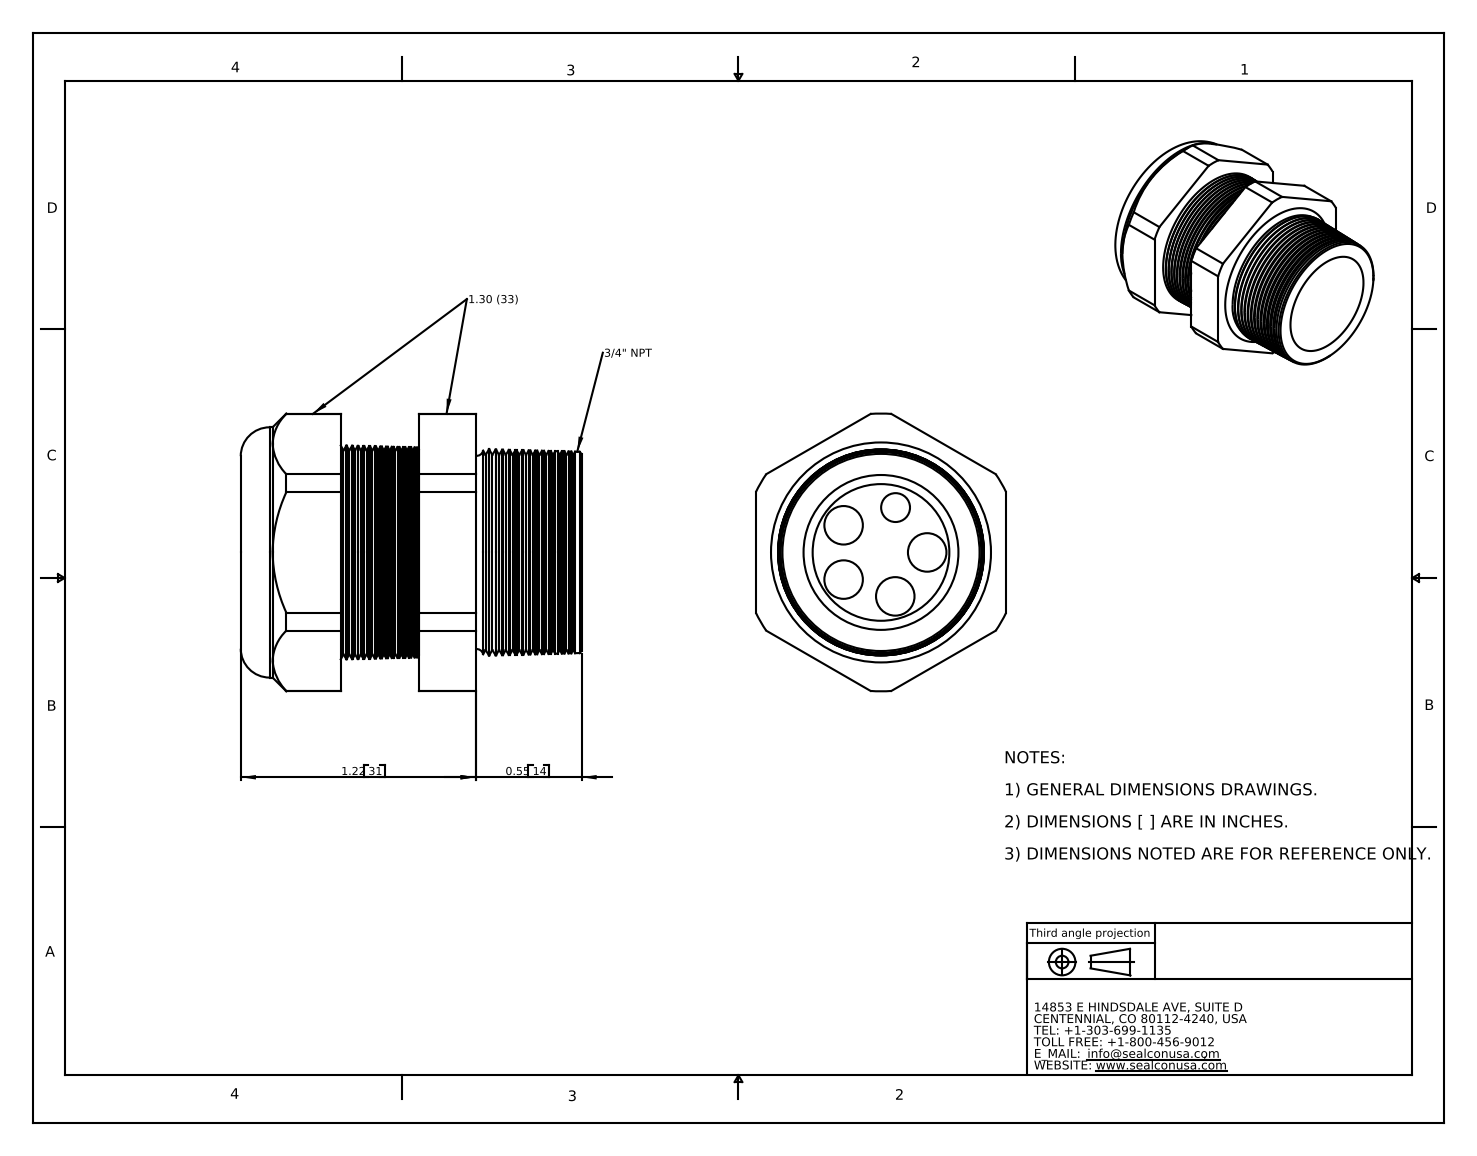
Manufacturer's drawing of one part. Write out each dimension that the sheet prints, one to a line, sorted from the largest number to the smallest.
1.22 31
0.55 14
